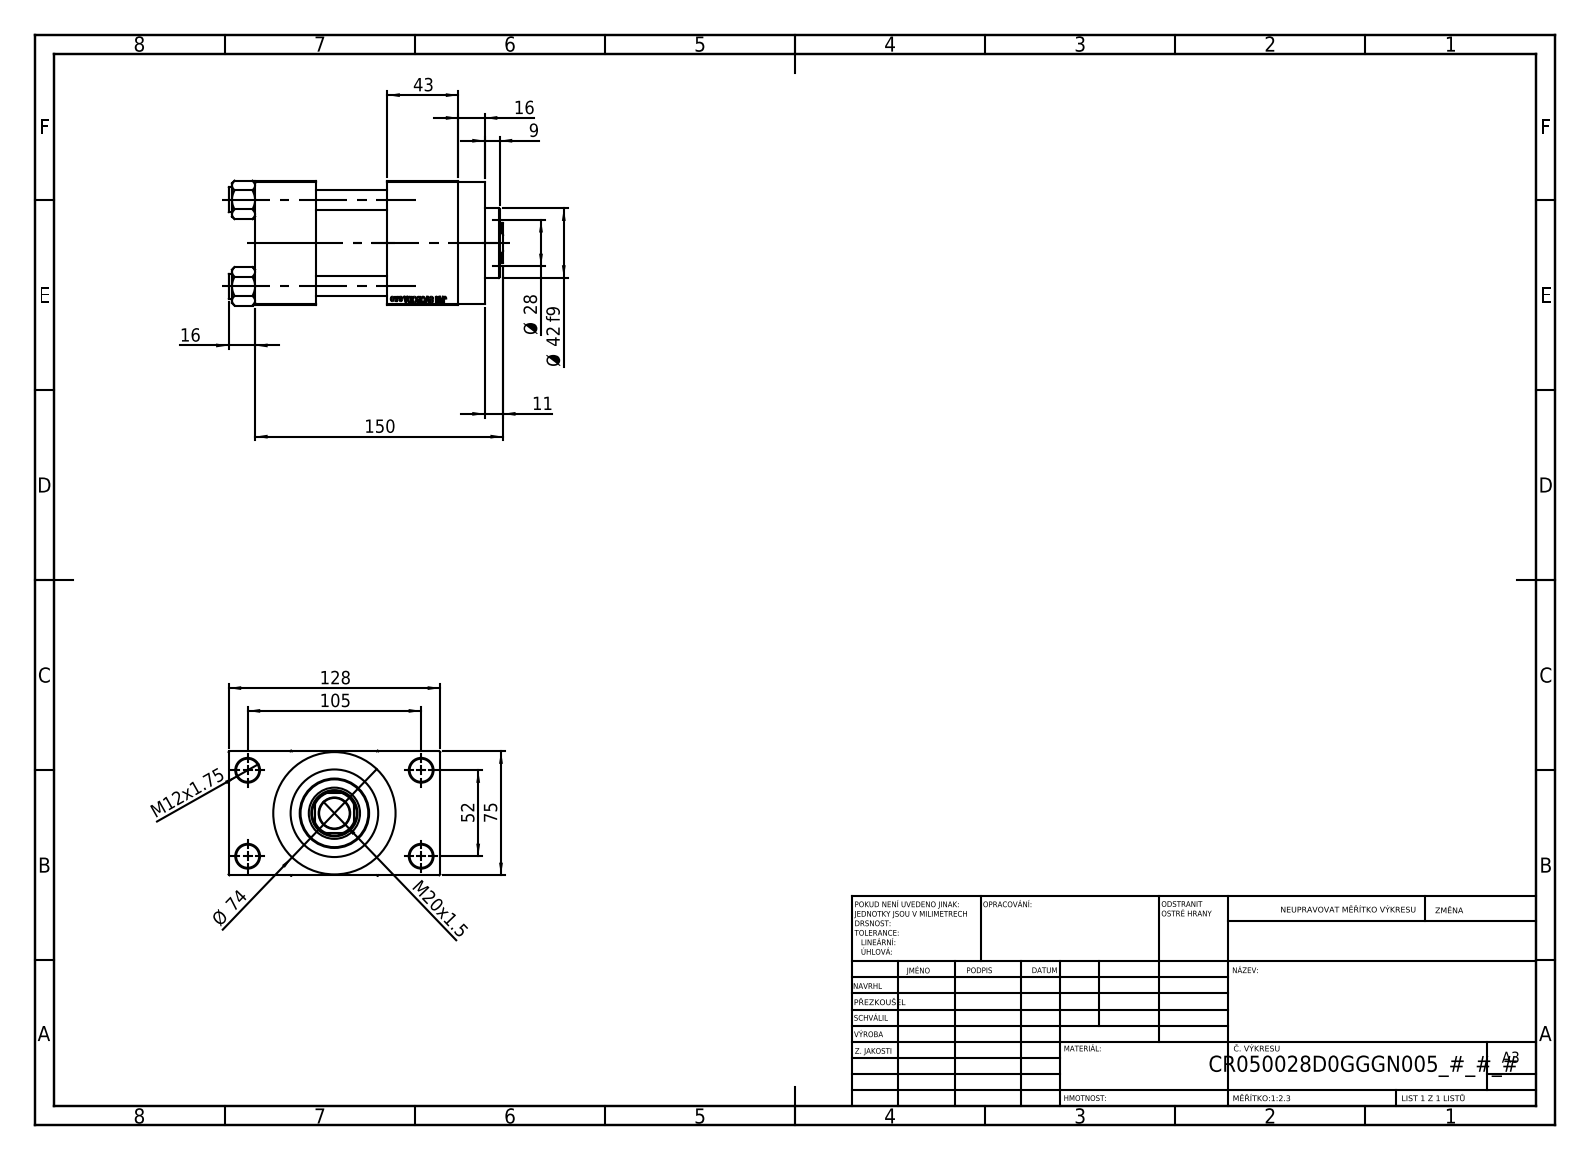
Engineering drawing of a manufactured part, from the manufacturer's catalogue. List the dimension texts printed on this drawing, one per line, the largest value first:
150
128
105
75
Ø 74
52
43
Ø 42 f9
Ø 28
M20x1.5
16
16
M12x1.75
11
9
